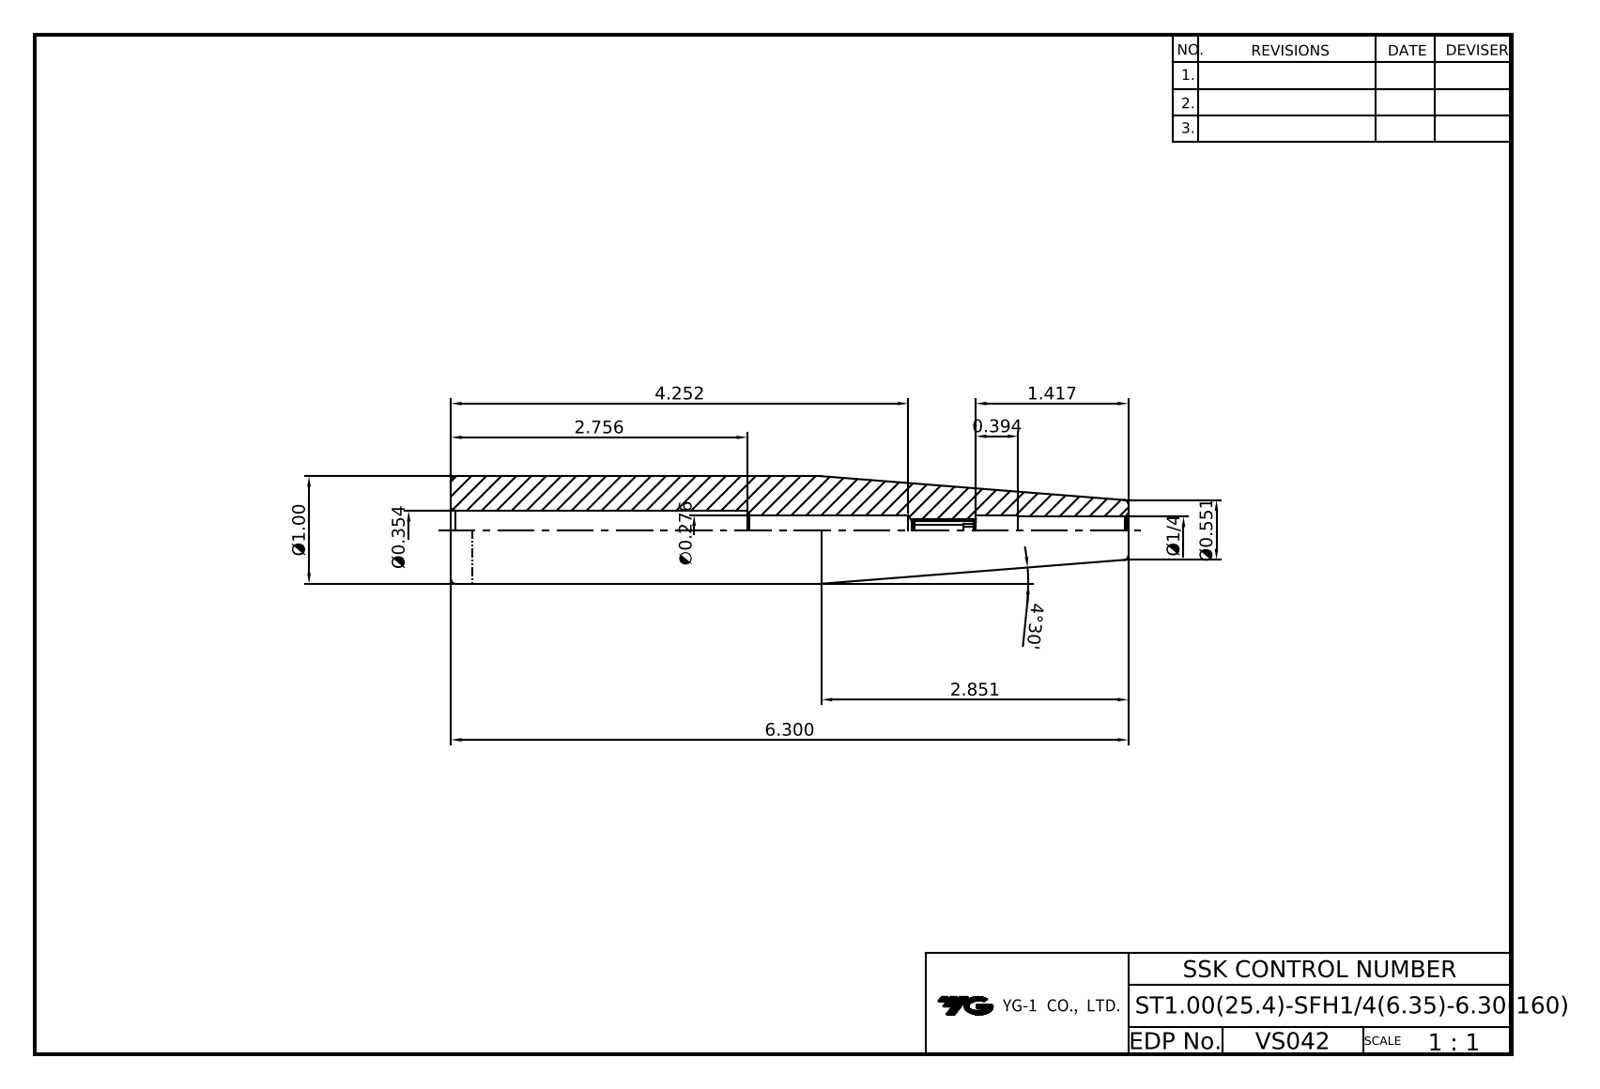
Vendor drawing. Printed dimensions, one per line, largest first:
6.300
4.252
4°30'
2.851
2.756
1.417
Ø1.00
Ø0.551
0.394
